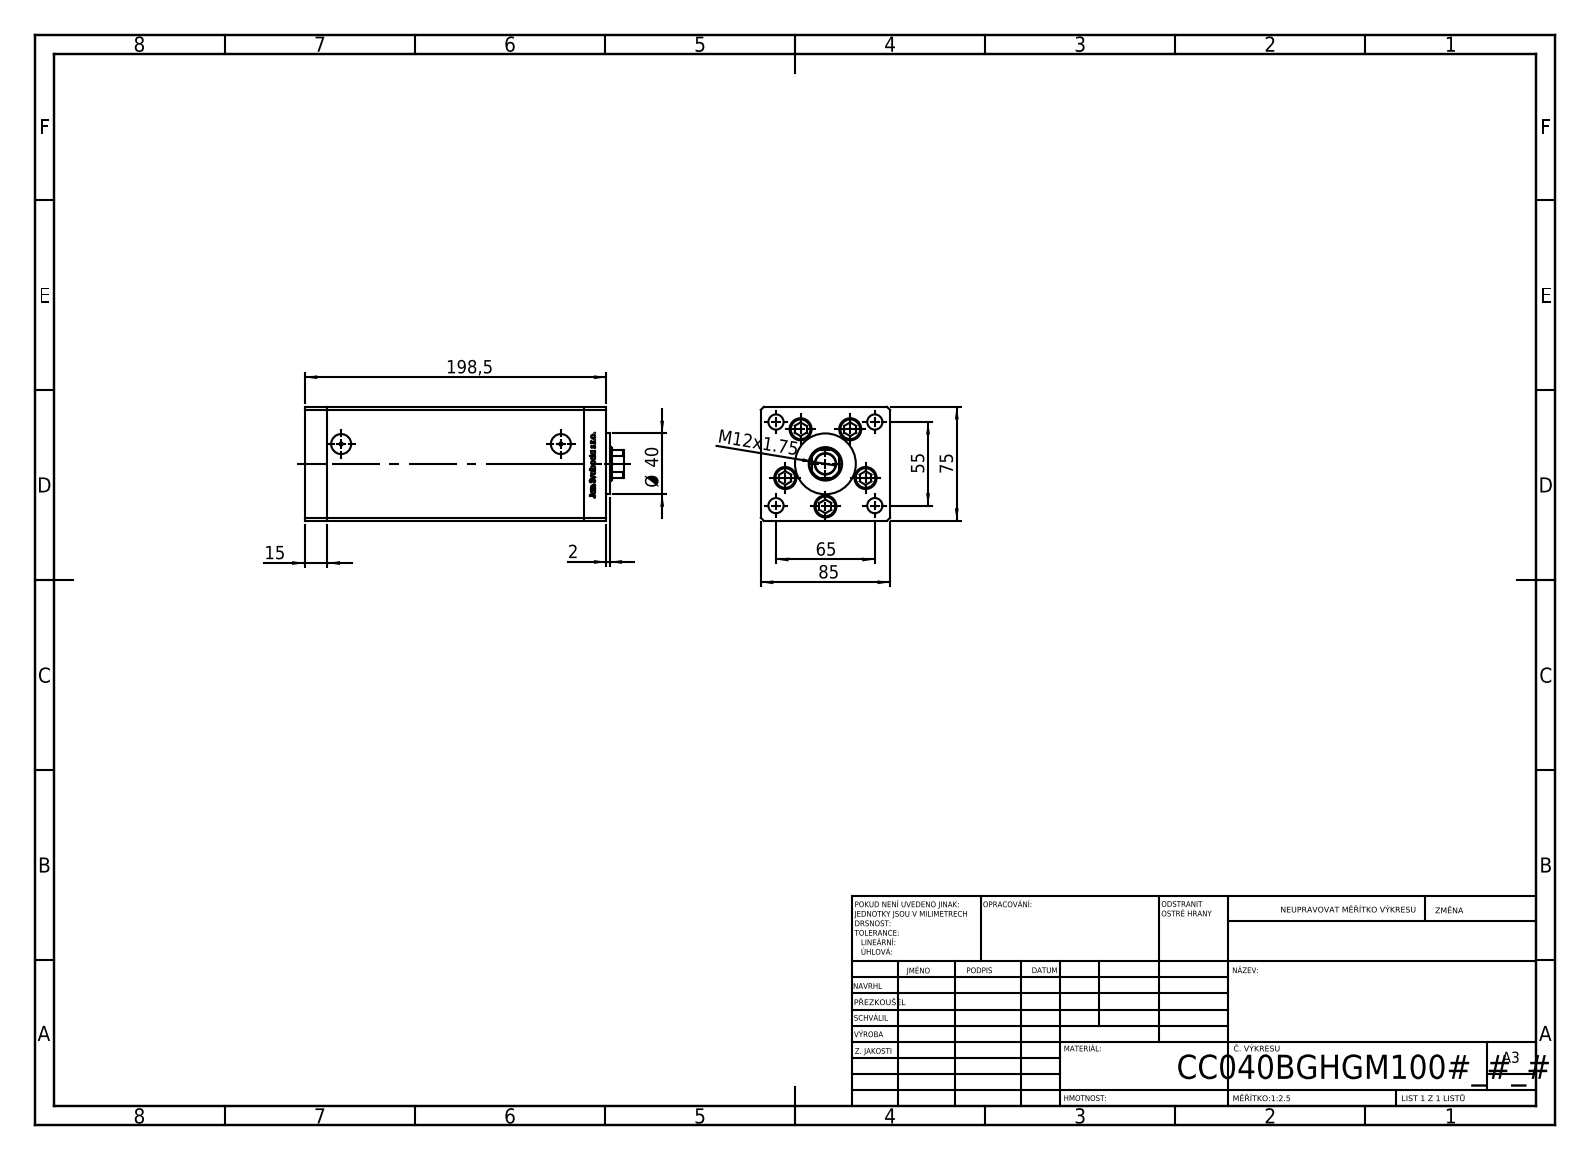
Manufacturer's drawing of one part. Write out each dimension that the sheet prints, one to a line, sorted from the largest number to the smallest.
198,5
85
75
65
55
Ø 40
15
M12x1.75
2
